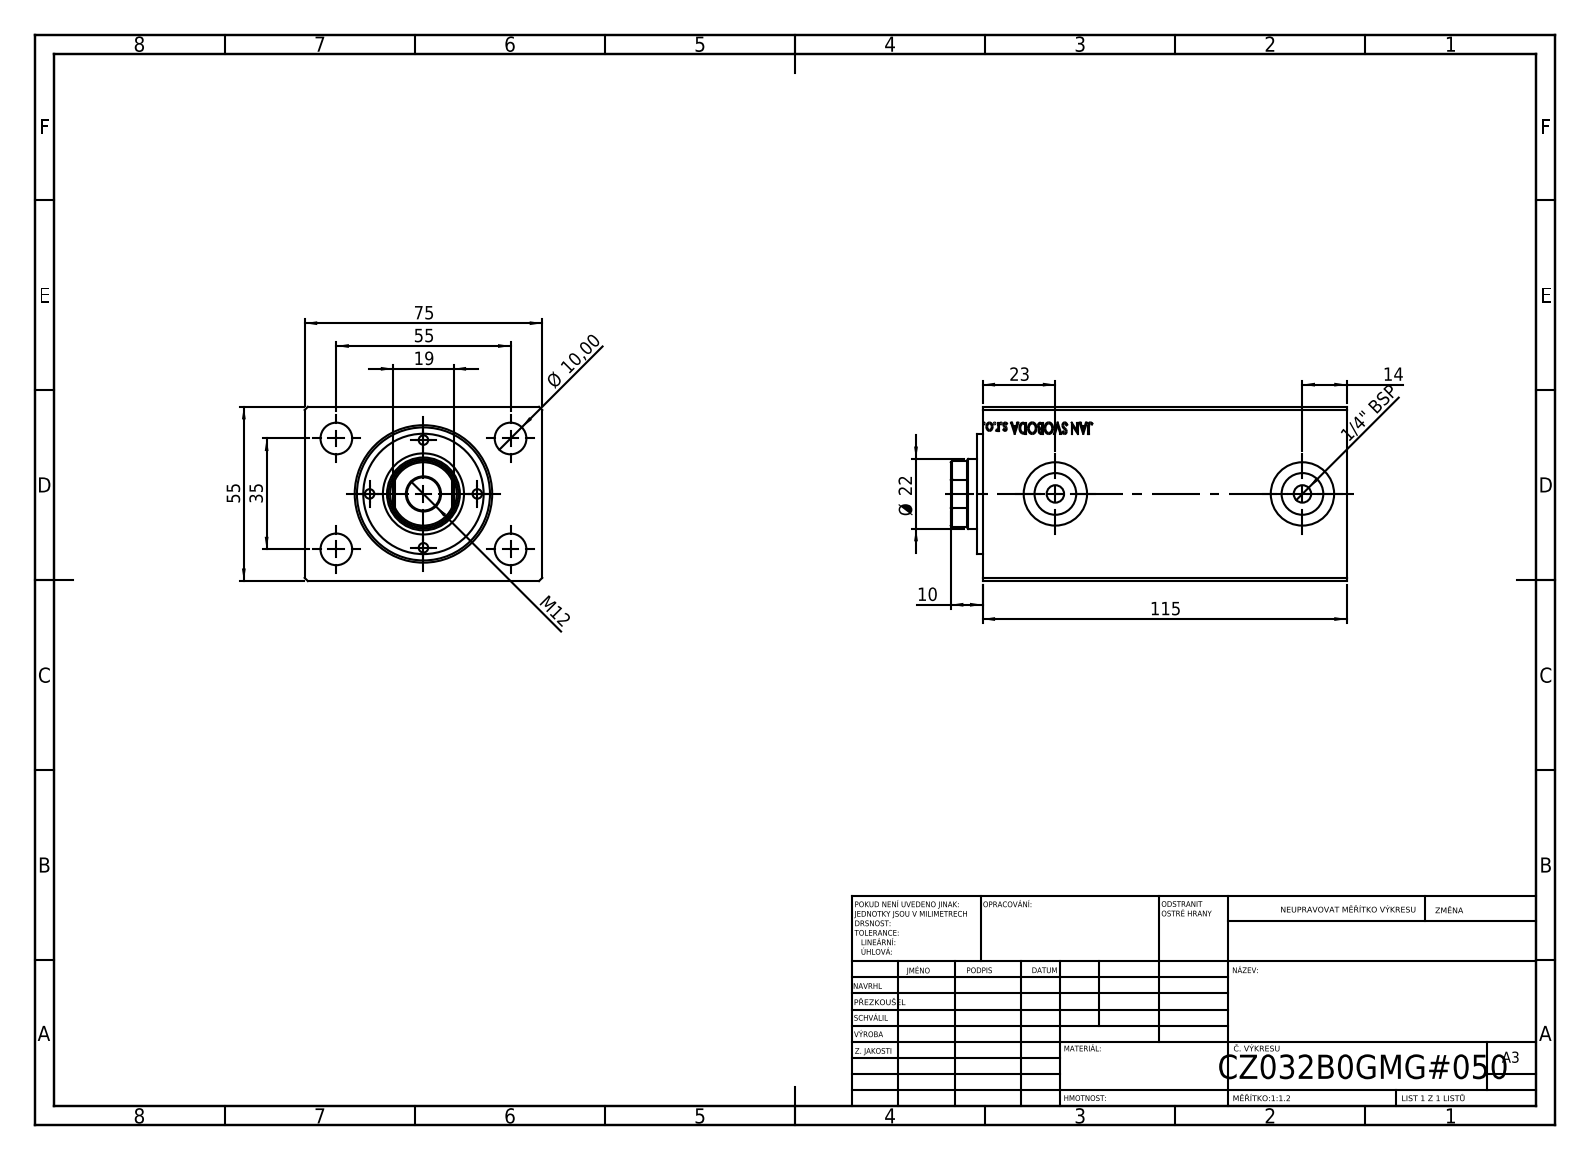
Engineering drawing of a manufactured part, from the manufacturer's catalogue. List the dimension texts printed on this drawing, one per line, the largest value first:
115
75
55
55
35
23
Ø 22
19
14
M12
Ø 10,00
10
1/4" BSP
